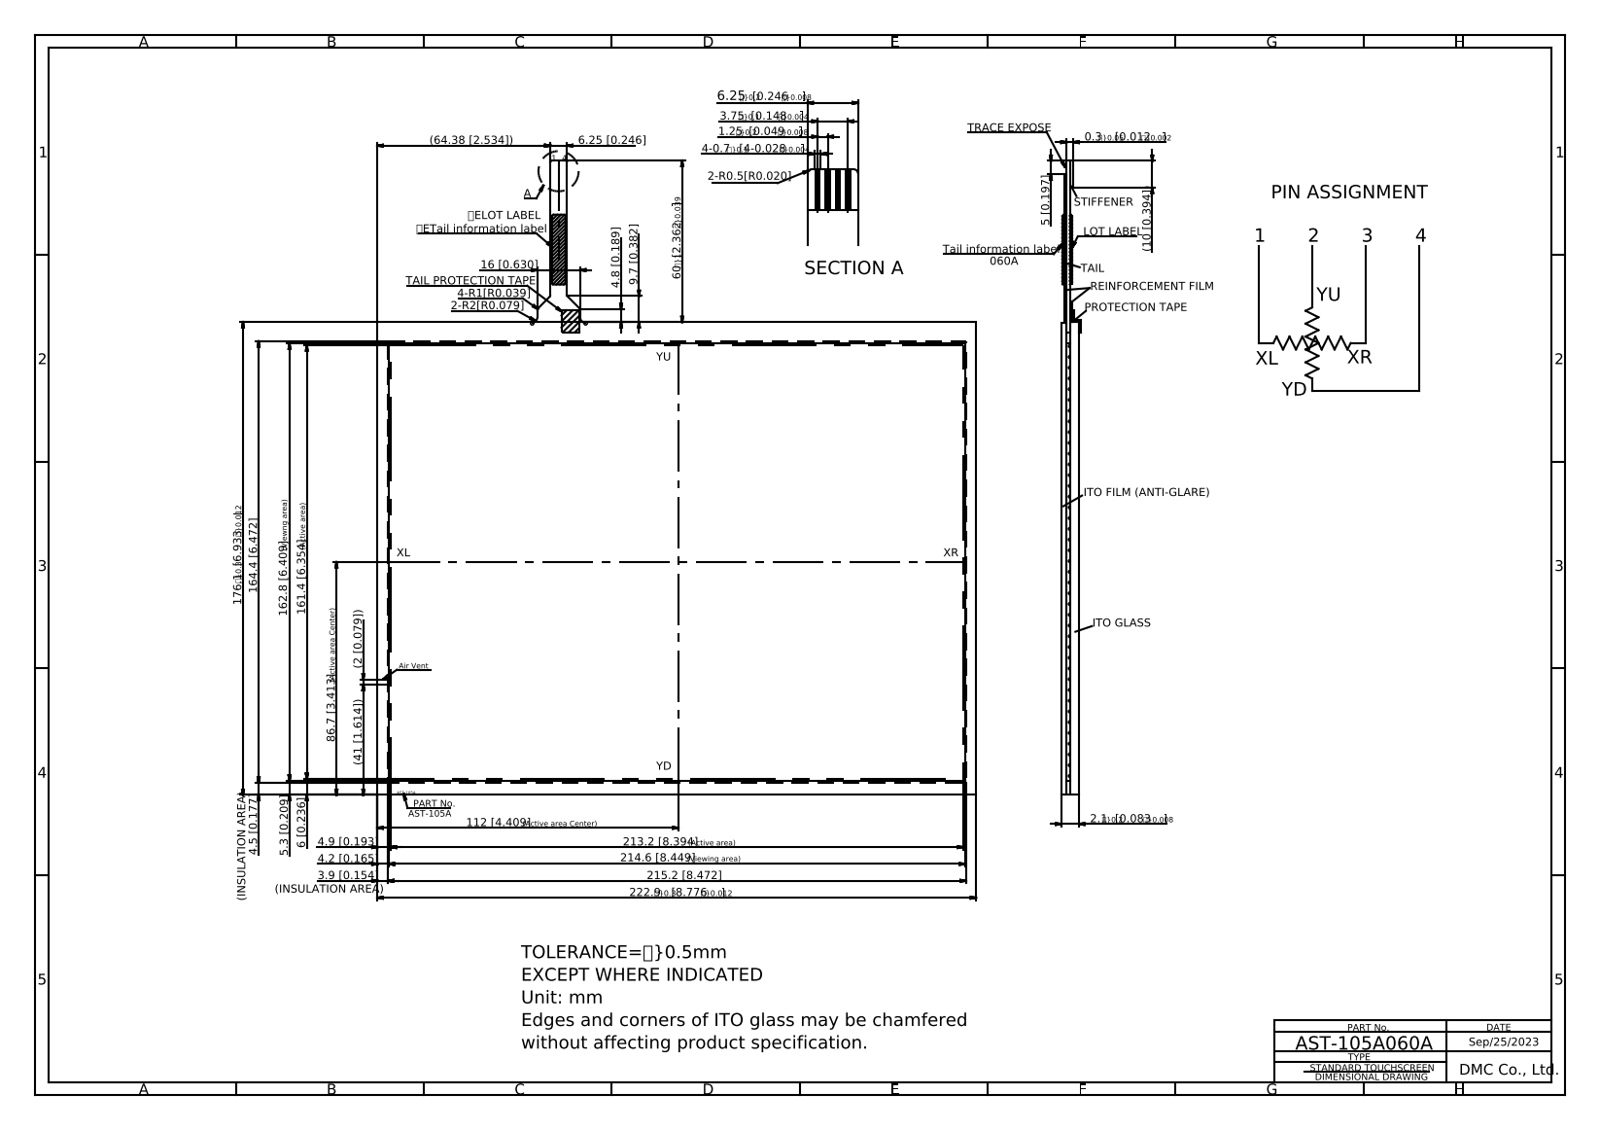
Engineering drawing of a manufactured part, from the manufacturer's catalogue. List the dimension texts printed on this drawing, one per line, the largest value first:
222.90
215.2 [8.472]
214.60 {\H0.6667x;(Viewing area)}
213.20 {\H0.6667x;(Active area)}
176.10
164.4 [6.472]
162.80 {\H0.6667x;(Viewng area)}
161.40 {\H0.6667x;(Active area)}
112.00 {\H0.6667x;(Active area Center)}
86.70 {\H0.6667x;(Active area Center)}
(64.38 [2.534])
60.00
(41 [1.614])
16 [0.630]
(10 [0.394])
9.7 [0.382]
6.25 [0.246]
6 [0.236]
5.3 [0.209]
5 [0.197]
4.9 [0.193]
4.8 [0.189]
4.5 [0.177]
4.2 [0.165]
4-0.7{\H0.66667x;?}0.1}[4-0.028{\H0.66667x;?}0.004}]
3.9 [0.154]
3.75{\H0.66667x;?}0.1}[0.148{\H0.66667x;?}0.004}]
2.1{\H0.6667x;?}0.2}[0.083{\H0.66667x;?}0.008}]
(2 [0.079])
1.25{\H0.66667x;?}0.2}[0.049{\H0.66667x;?}0.008}]
0.3{\H0.6667x;?}0.05}[0.012{\H0.66667x;?}0.002}]
